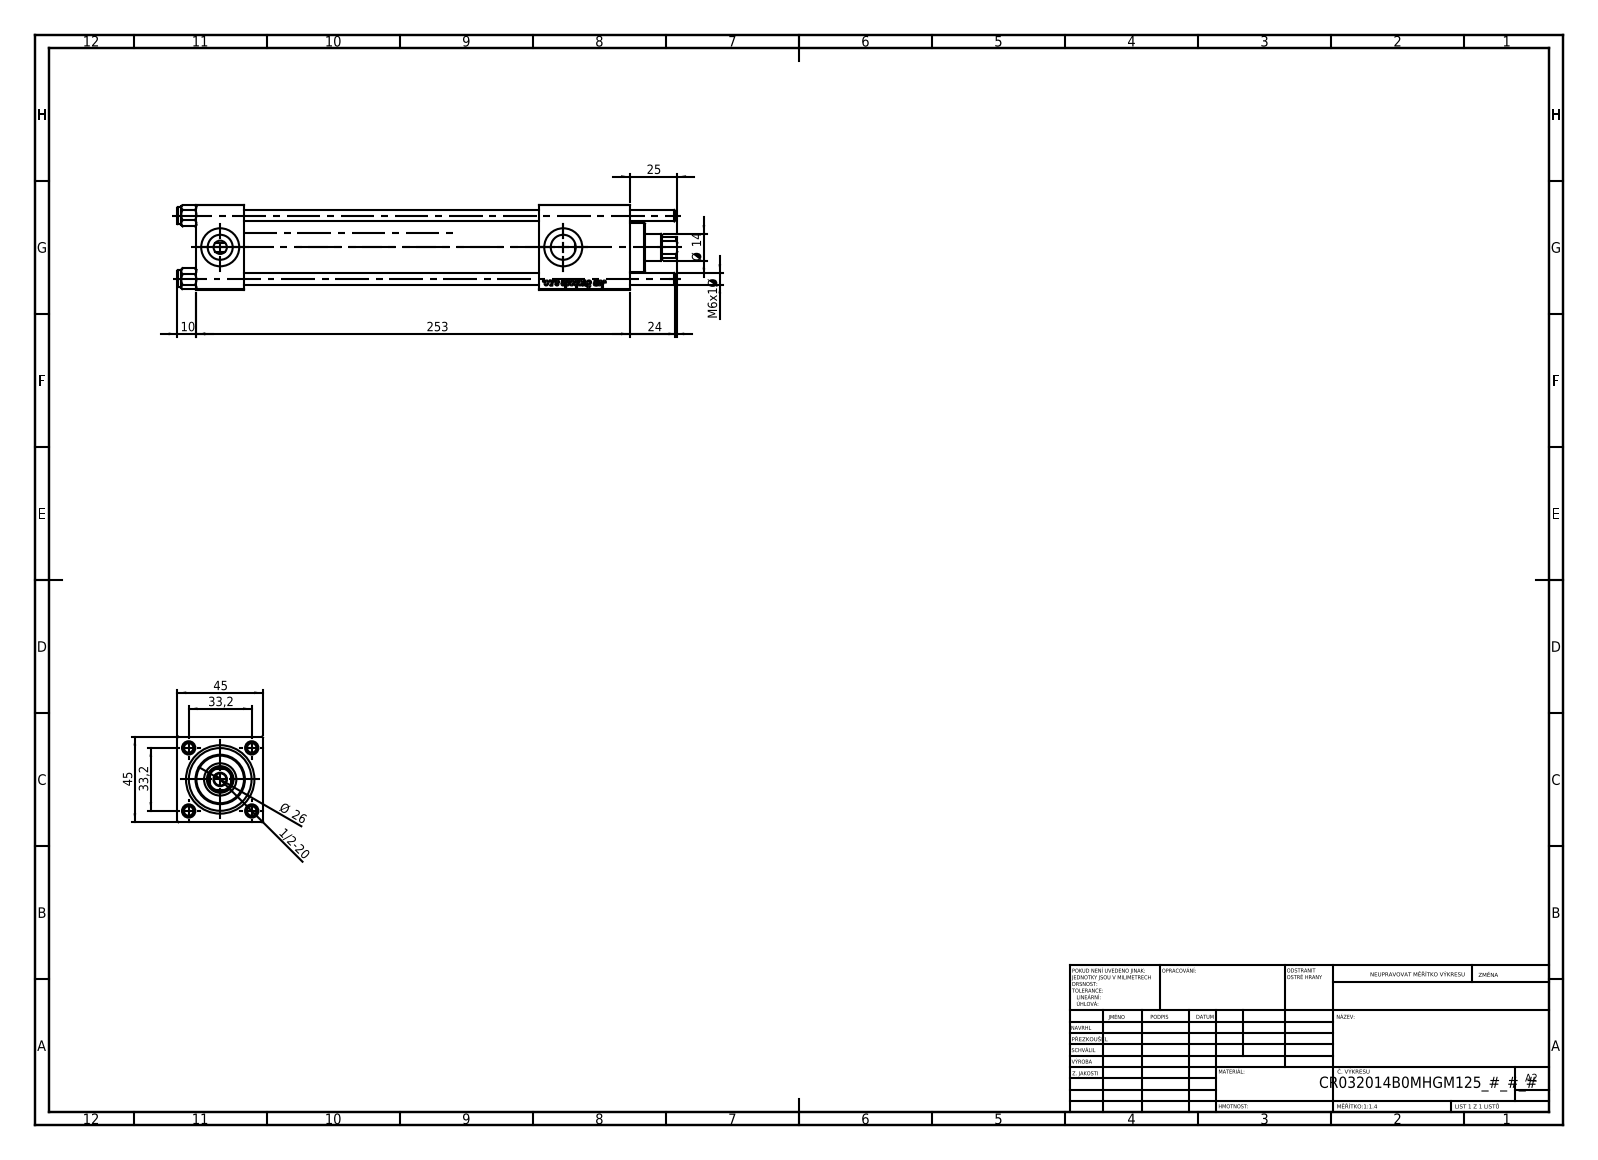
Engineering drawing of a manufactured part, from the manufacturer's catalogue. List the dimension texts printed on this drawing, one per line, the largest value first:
253
45
45
33,2
33,2
Ø 26
25
24
Ø 14
10
M6x1 Ø
1/2-20
